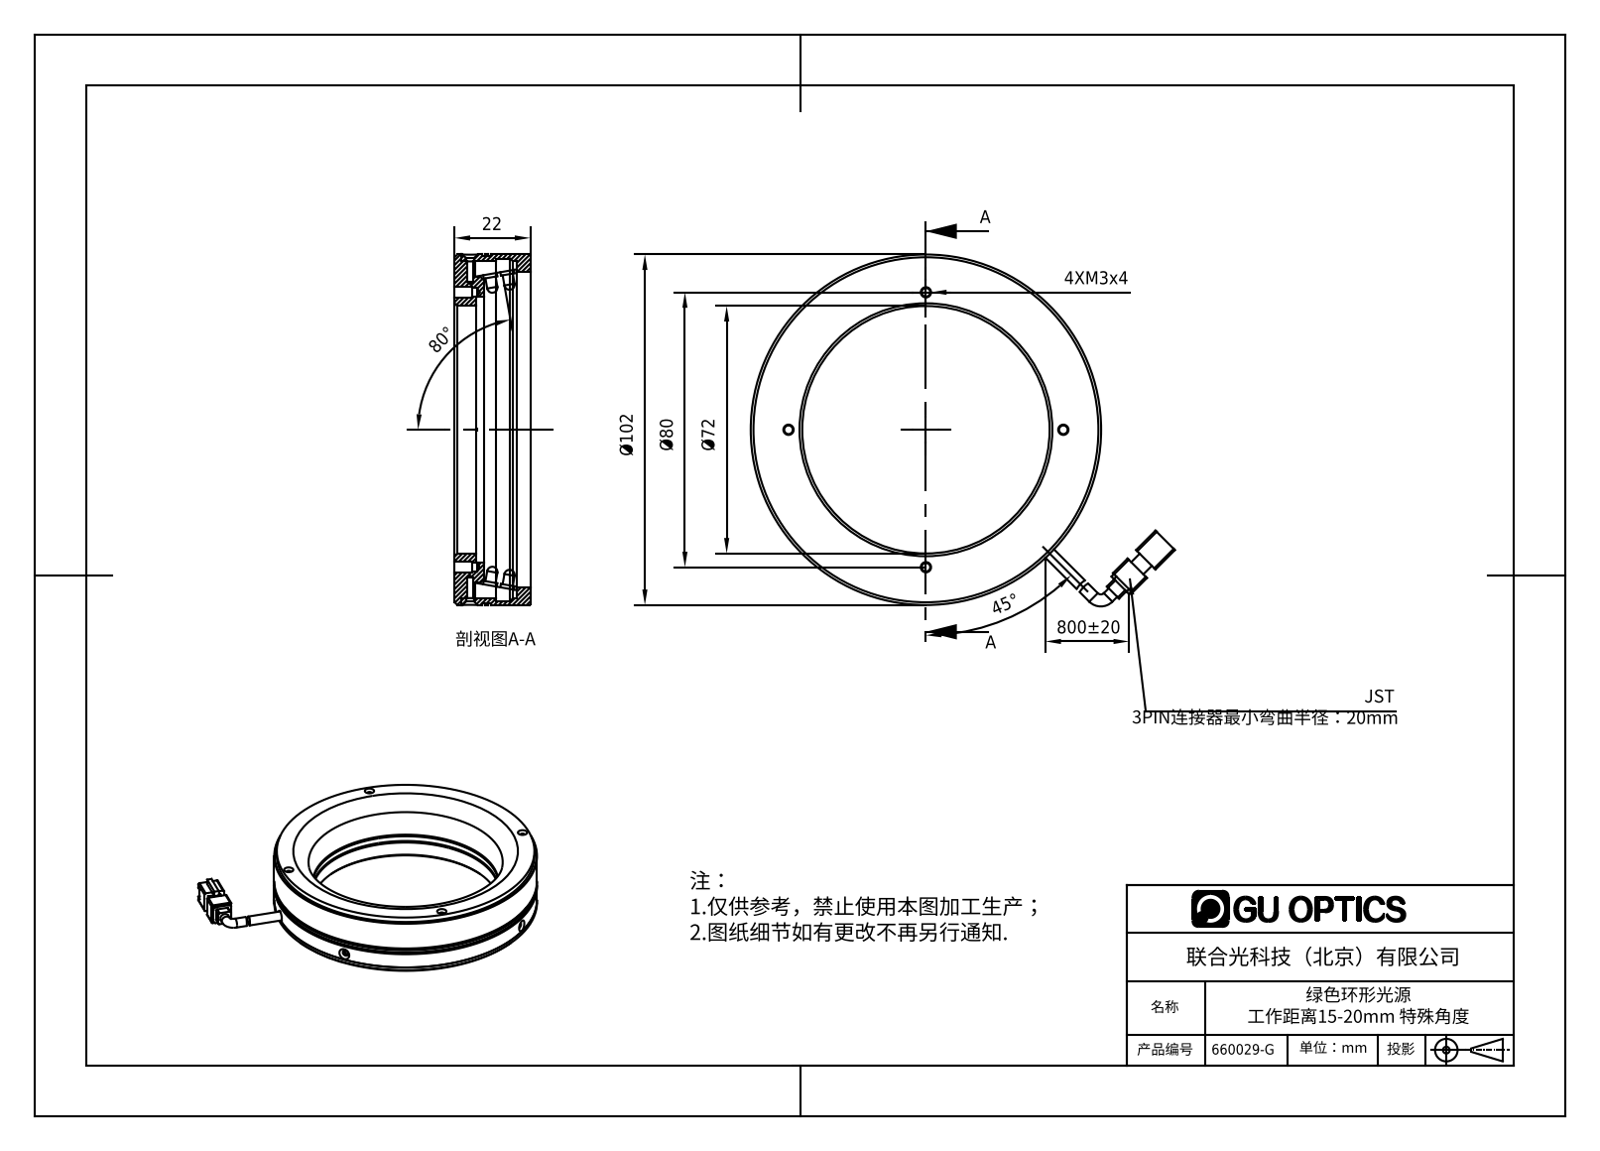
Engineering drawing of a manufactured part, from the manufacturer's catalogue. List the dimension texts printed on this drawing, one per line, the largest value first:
800±20
Ø102
Ø80
80°
Ø72
45°
22
4XM3x4
